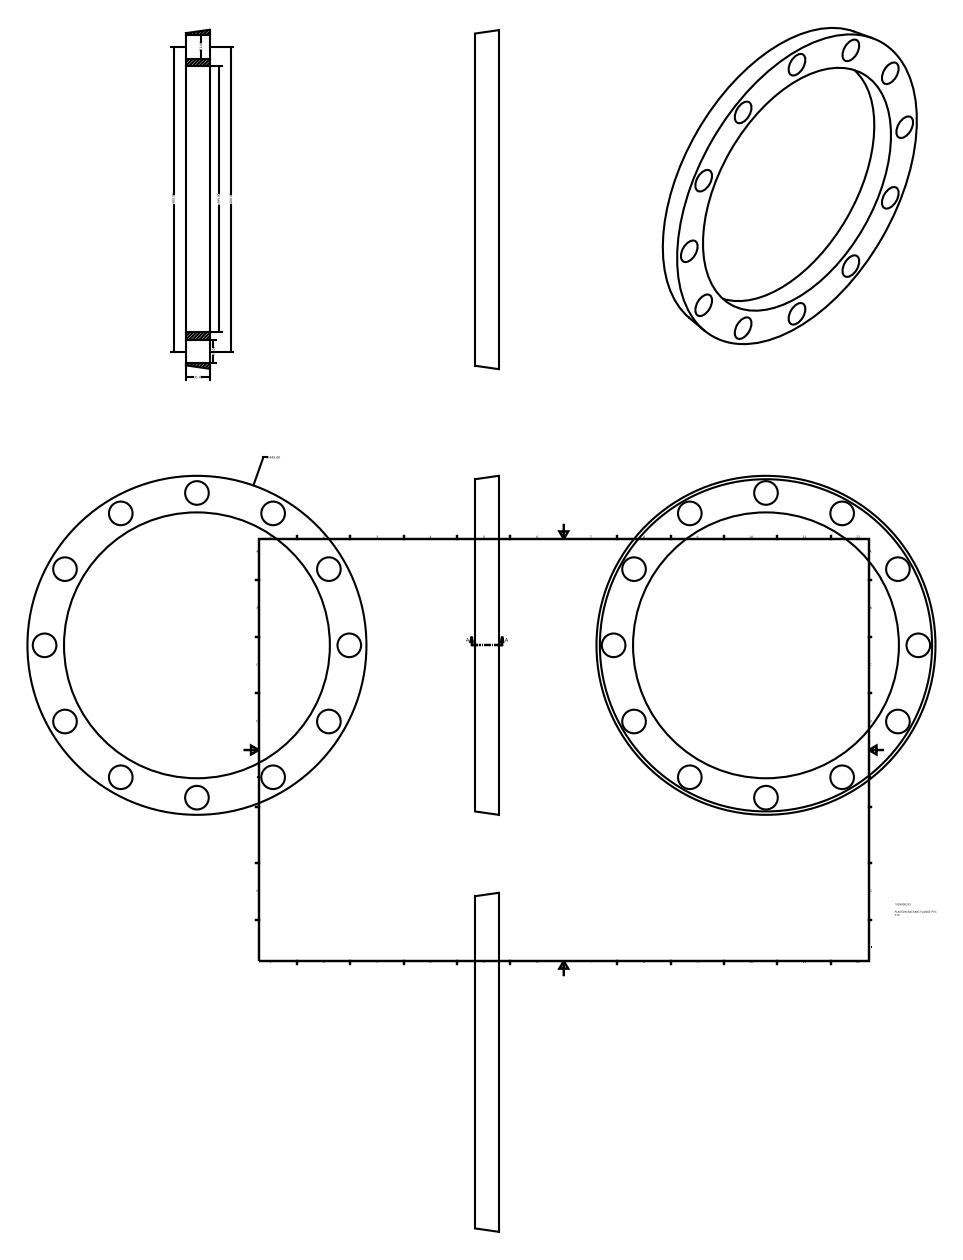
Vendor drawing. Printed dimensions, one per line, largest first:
∅445.00
400.00
400.00
n349.00
31.00
31.00
31.00
